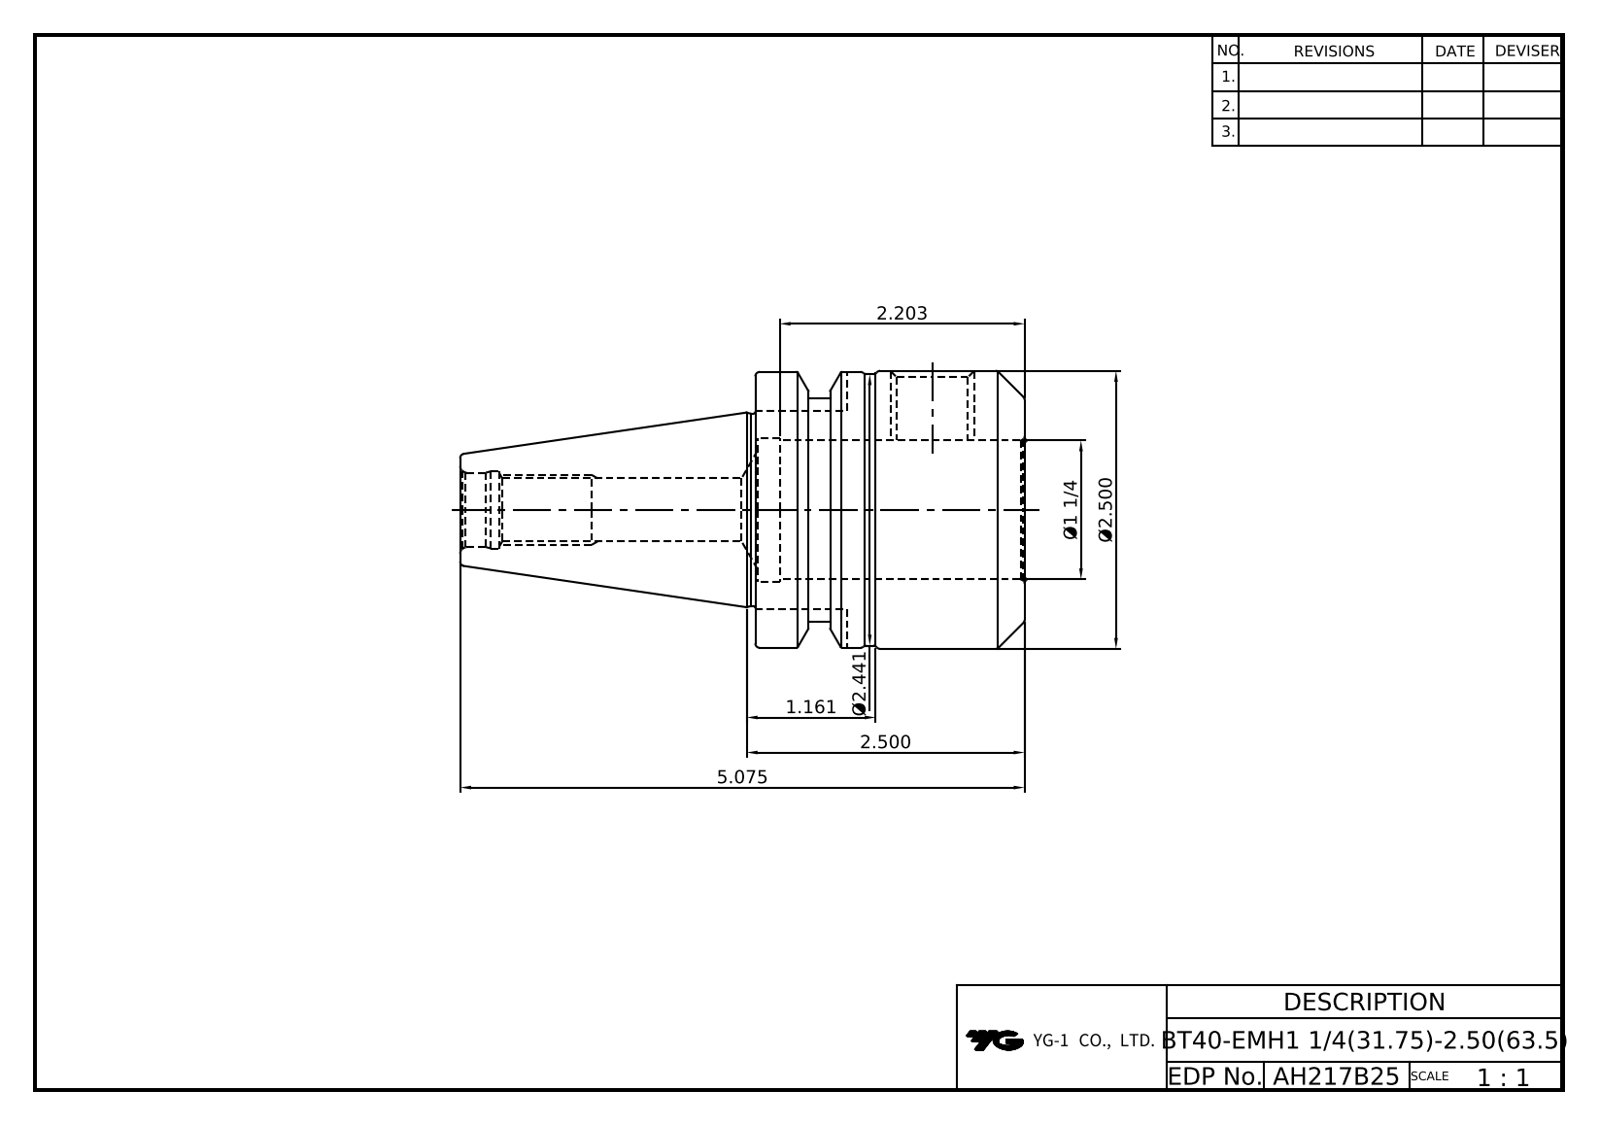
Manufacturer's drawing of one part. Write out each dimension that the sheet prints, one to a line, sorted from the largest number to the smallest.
5.075
Ø2.500
2.500
Ø2.441
2.203
Ø1 1/4
1.161
